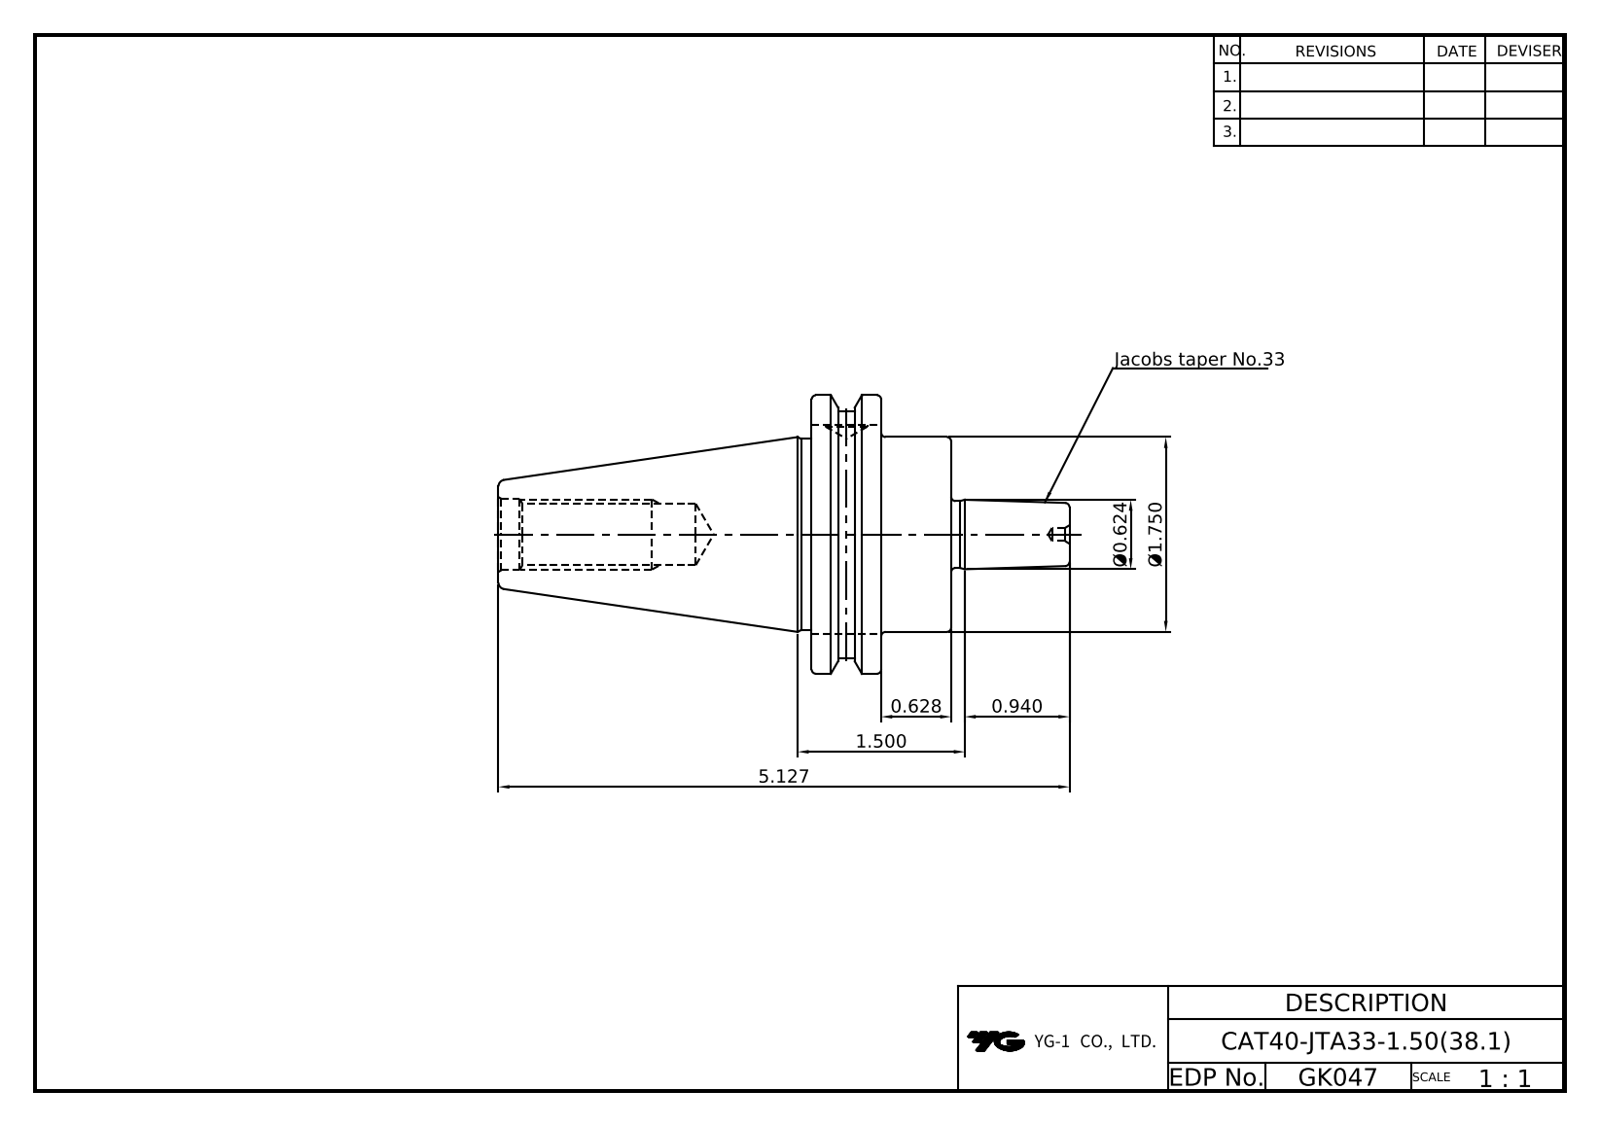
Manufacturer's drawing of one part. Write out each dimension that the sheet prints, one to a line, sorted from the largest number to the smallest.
5.127
Ø1.750
1.500
0.940
0.628
Ø0.624
